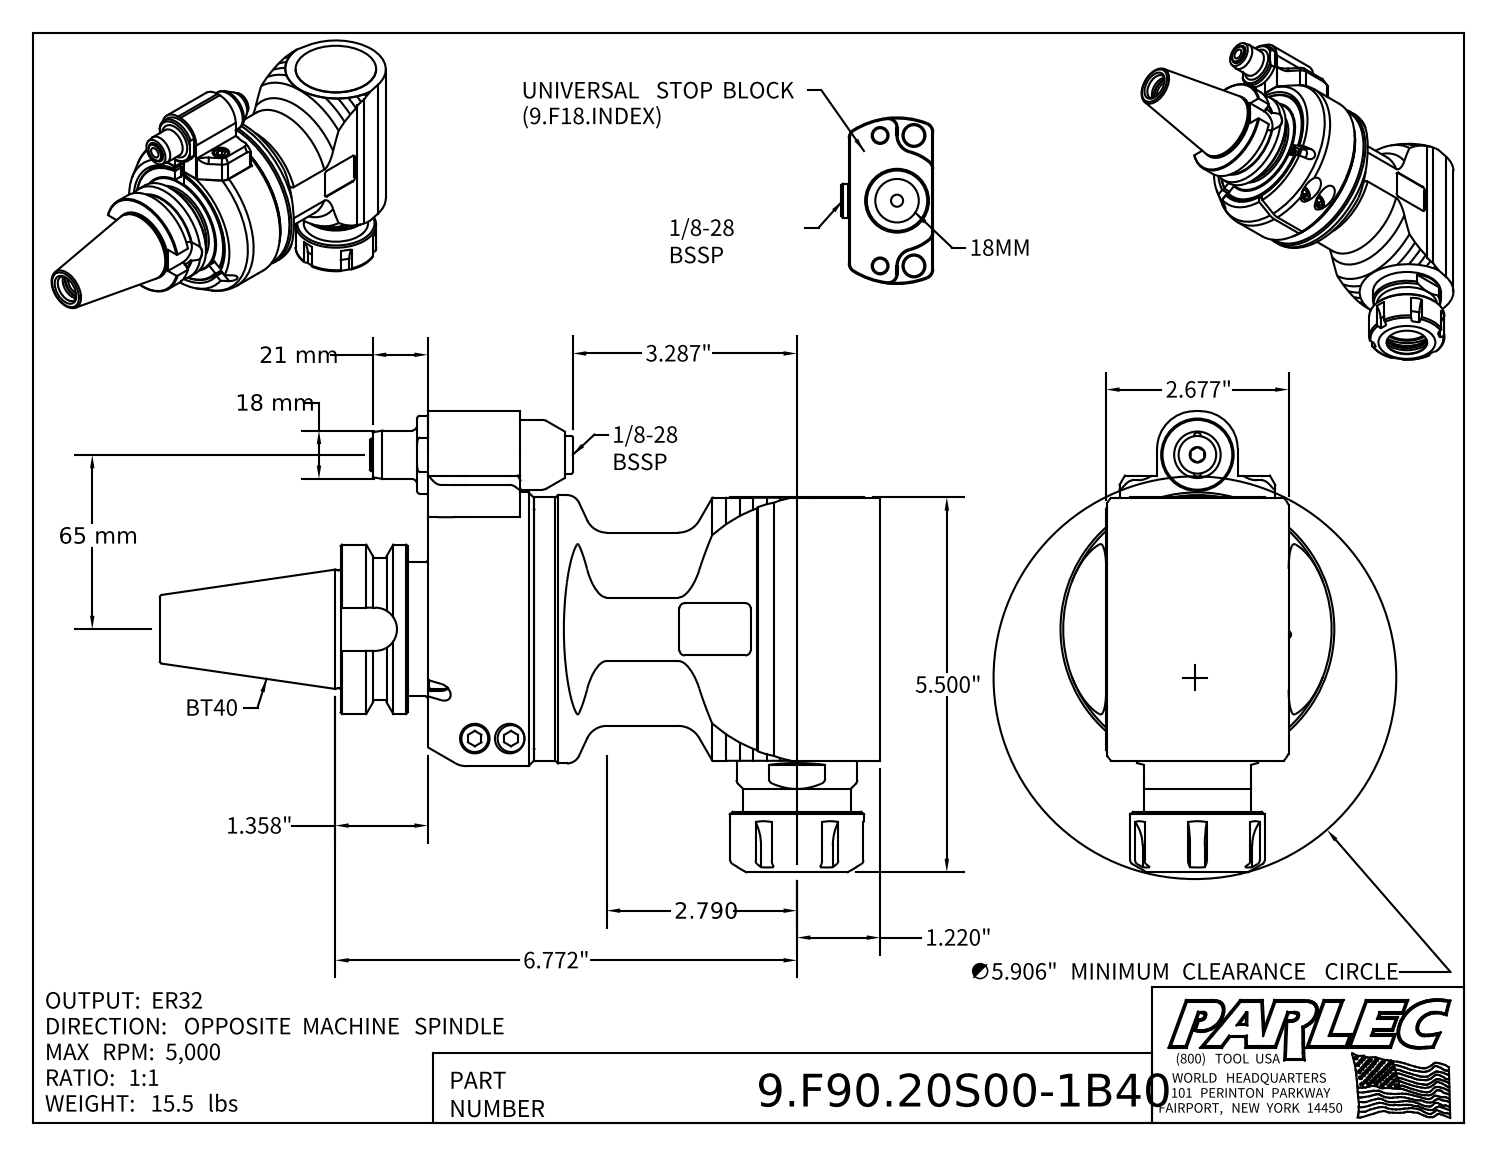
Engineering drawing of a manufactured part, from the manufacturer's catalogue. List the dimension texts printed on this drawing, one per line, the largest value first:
65 mm
21 mm
18 mm
6.772"
∅5.906" MINIMUM CLEARANCE CIRCLE
5.500"
3.287"
2.790
2.677"
1.358"
1.220"
